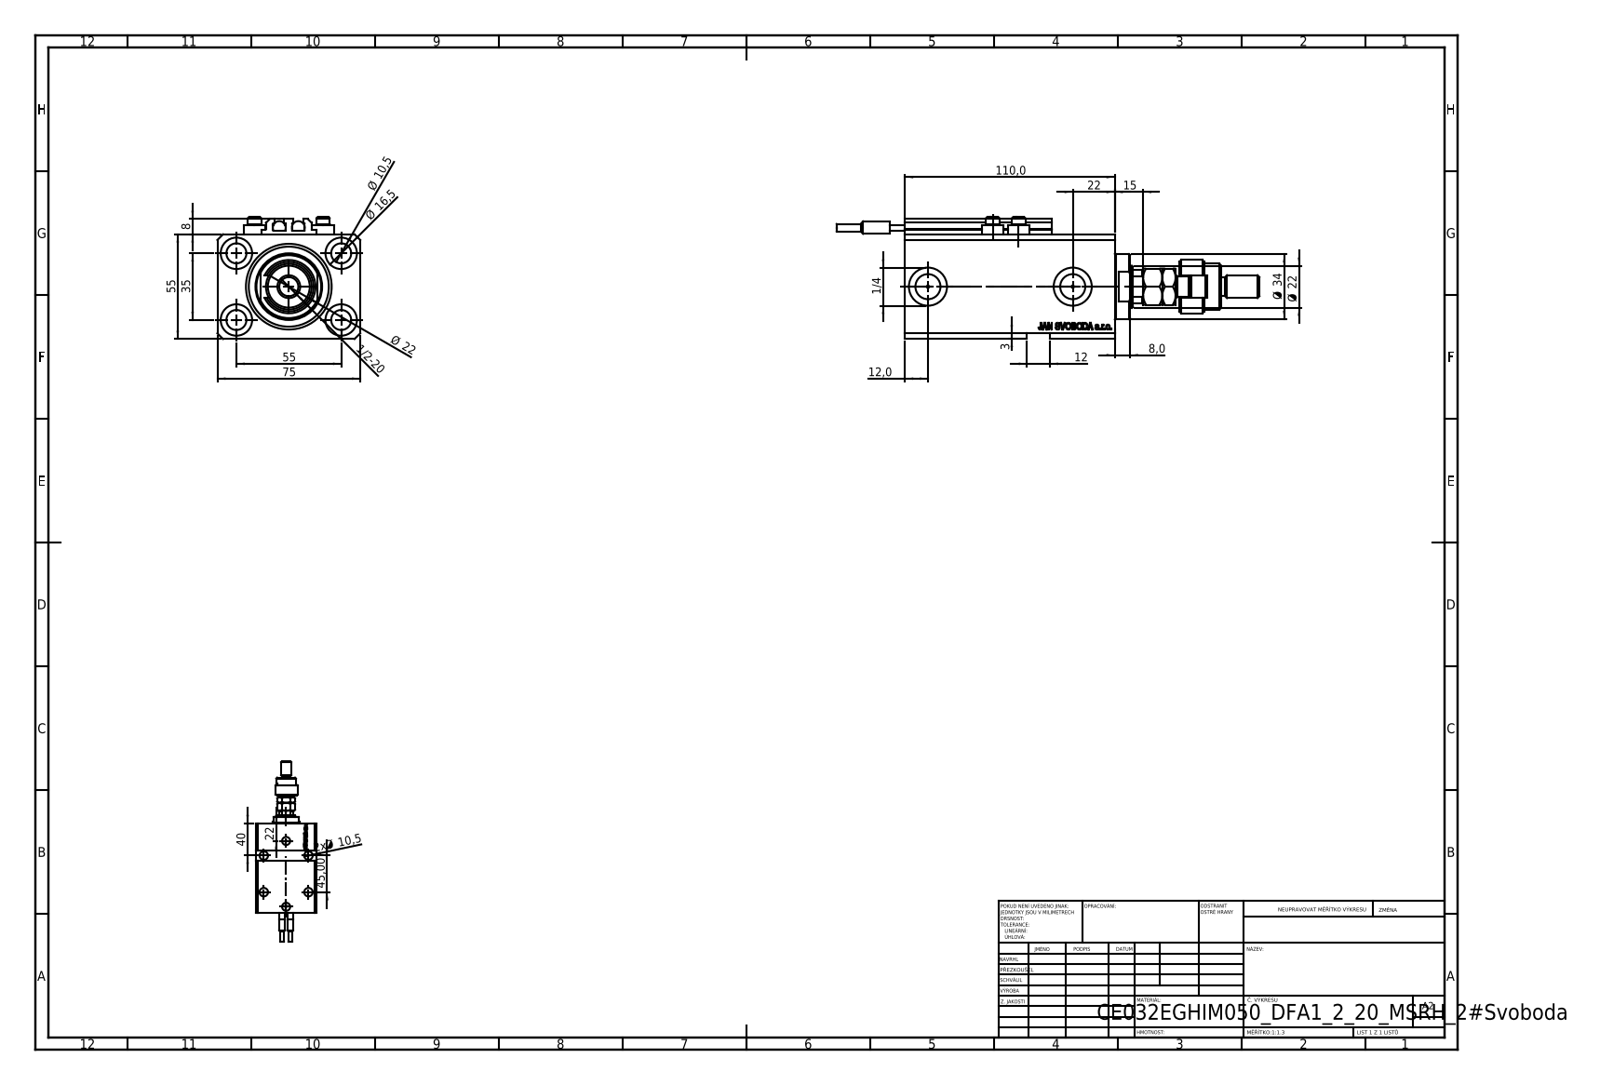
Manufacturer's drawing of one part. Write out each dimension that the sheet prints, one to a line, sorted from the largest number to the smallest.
110,0
75
55
55
45,00
40
35
Ø 34
Ø 22
22
Ø 22
22
Ø 16,5
15
12,0
12
Ø 10,5
2x Ø 10,5
8
8,0
3
1/2-20
1/4
